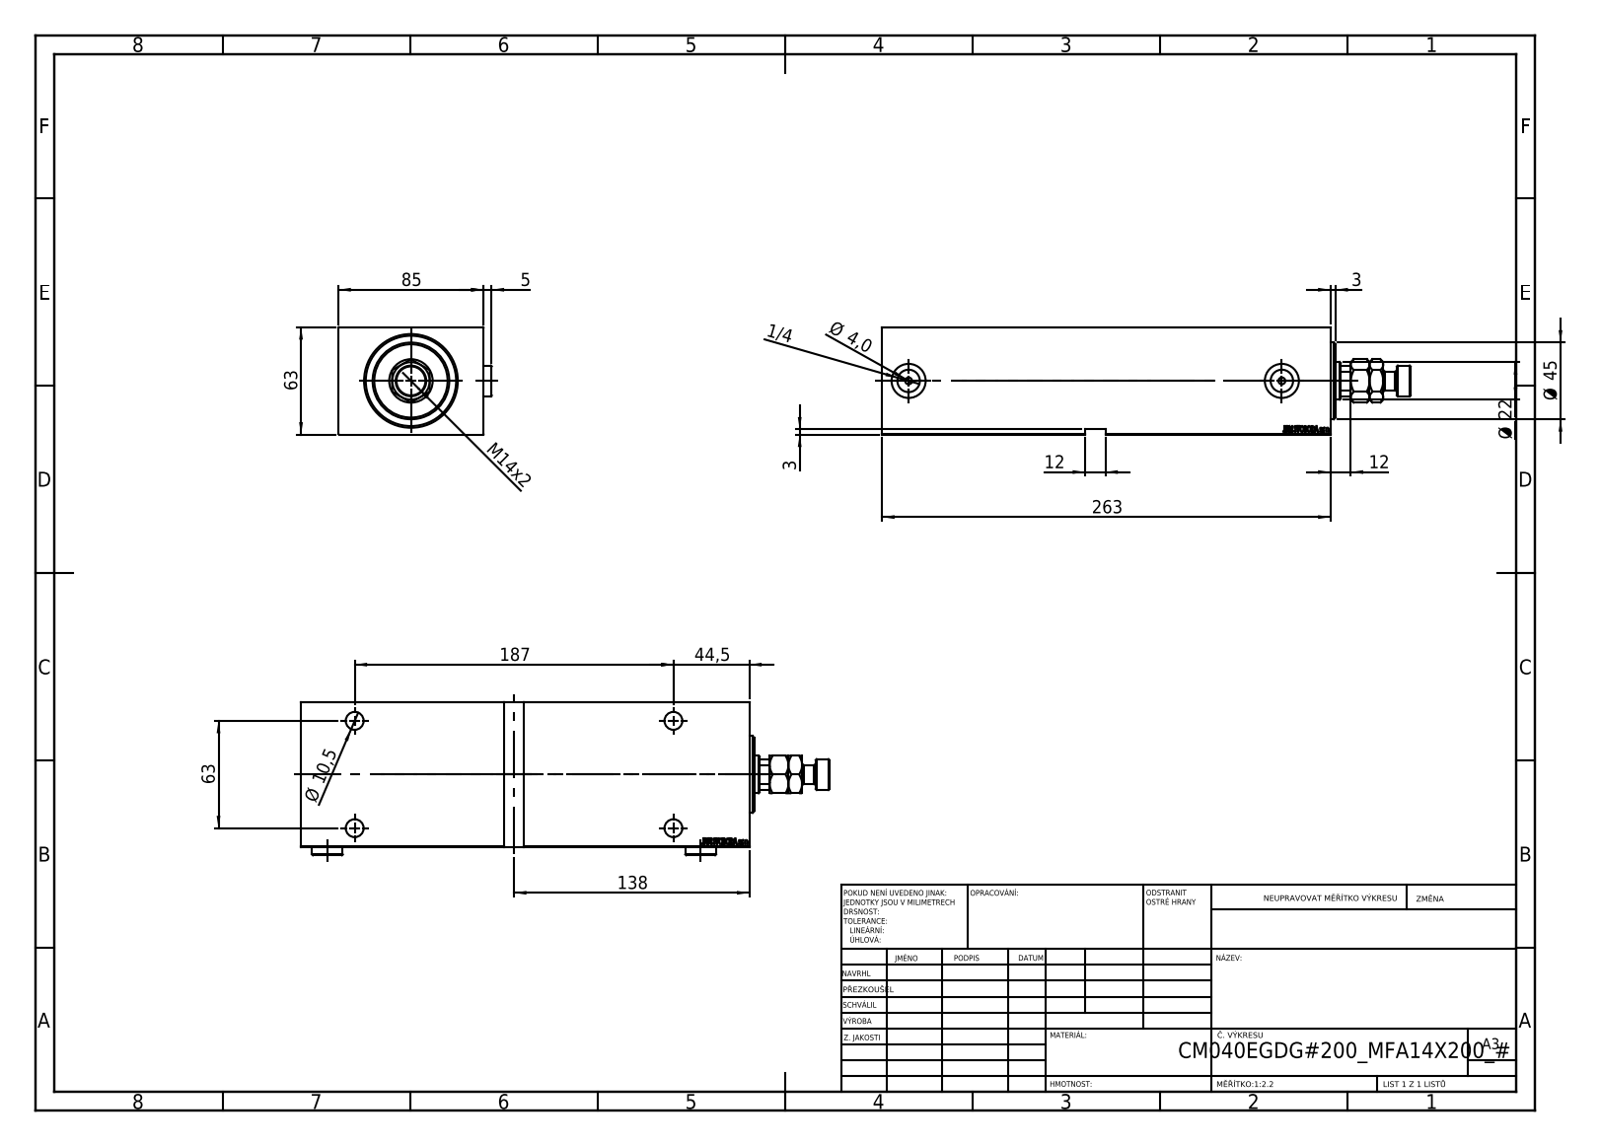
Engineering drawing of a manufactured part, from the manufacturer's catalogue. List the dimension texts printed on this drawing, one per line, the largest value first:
263
187
138
85
63
63
Ø 45
44,5
Ø 22
M14x2
12
12
Ø 10,5
5
Ø 4,0
3
3
1/4
